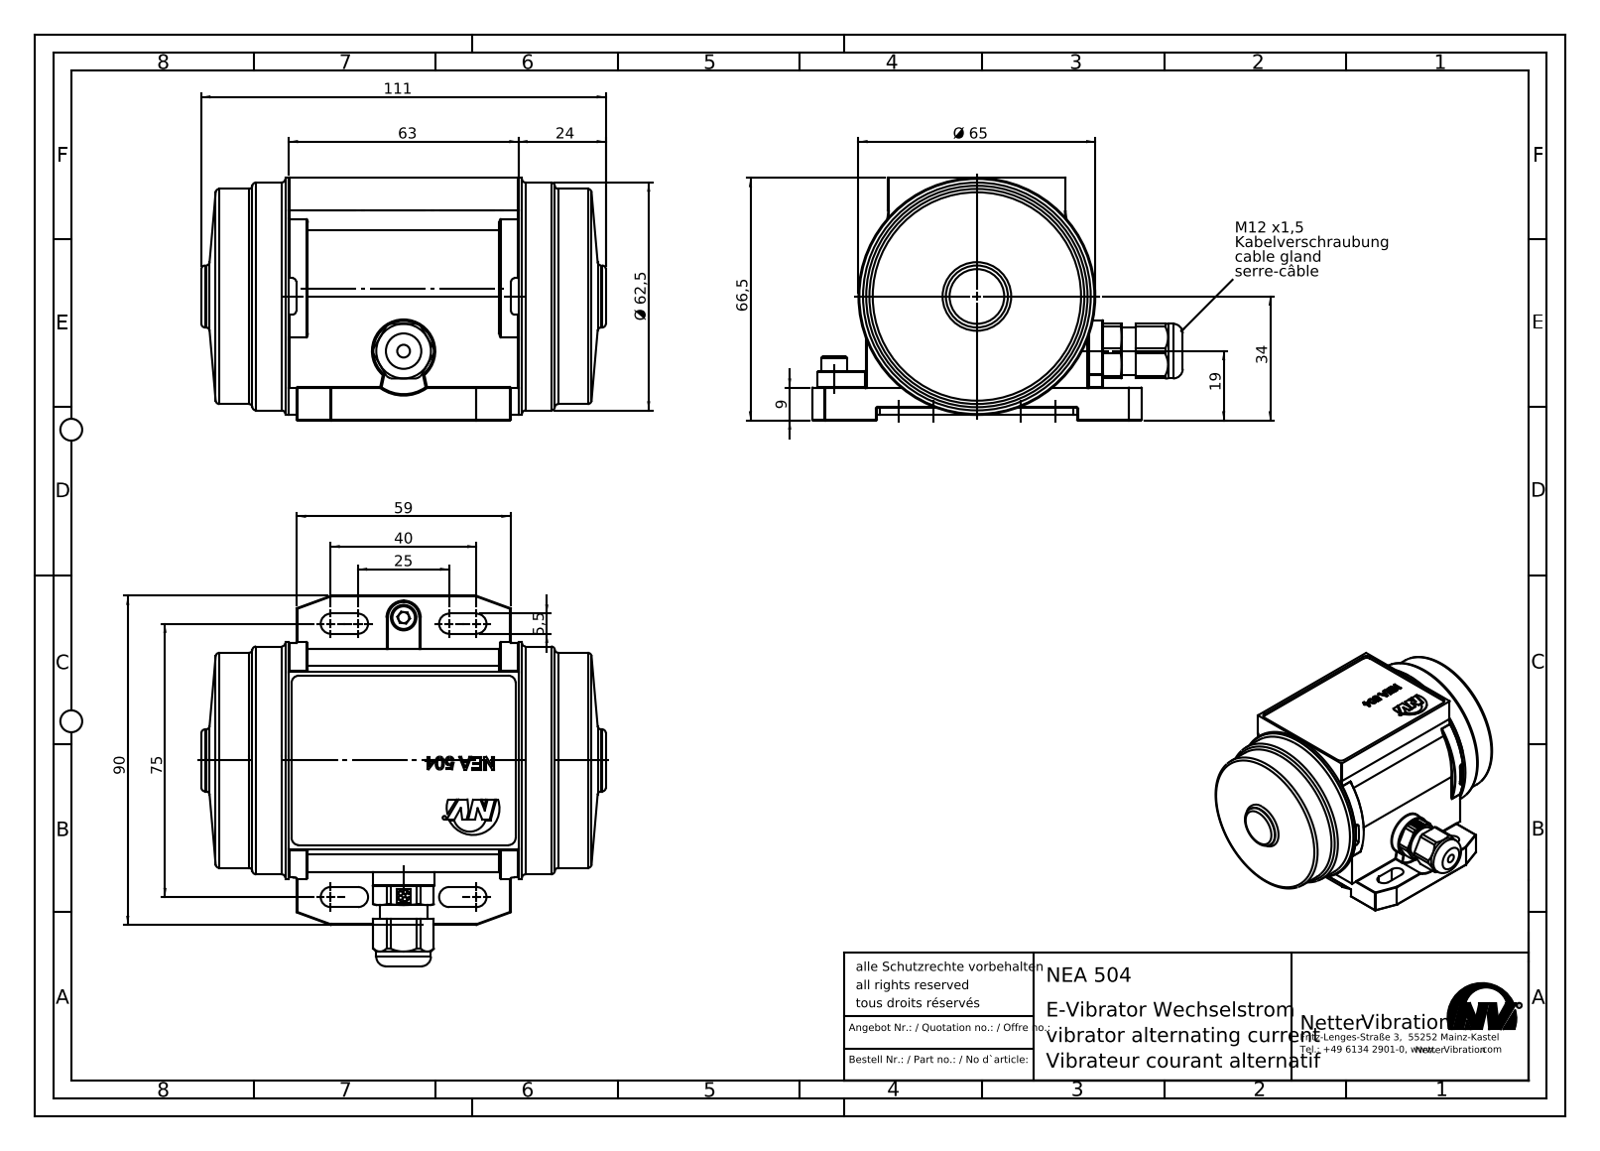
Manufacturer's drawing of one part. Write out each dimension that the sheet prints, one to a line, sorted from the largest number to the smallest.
111
90
75
66,5
Ø 65
63
Ø 62,5
59
40
34
25
24
19
9
5,5
